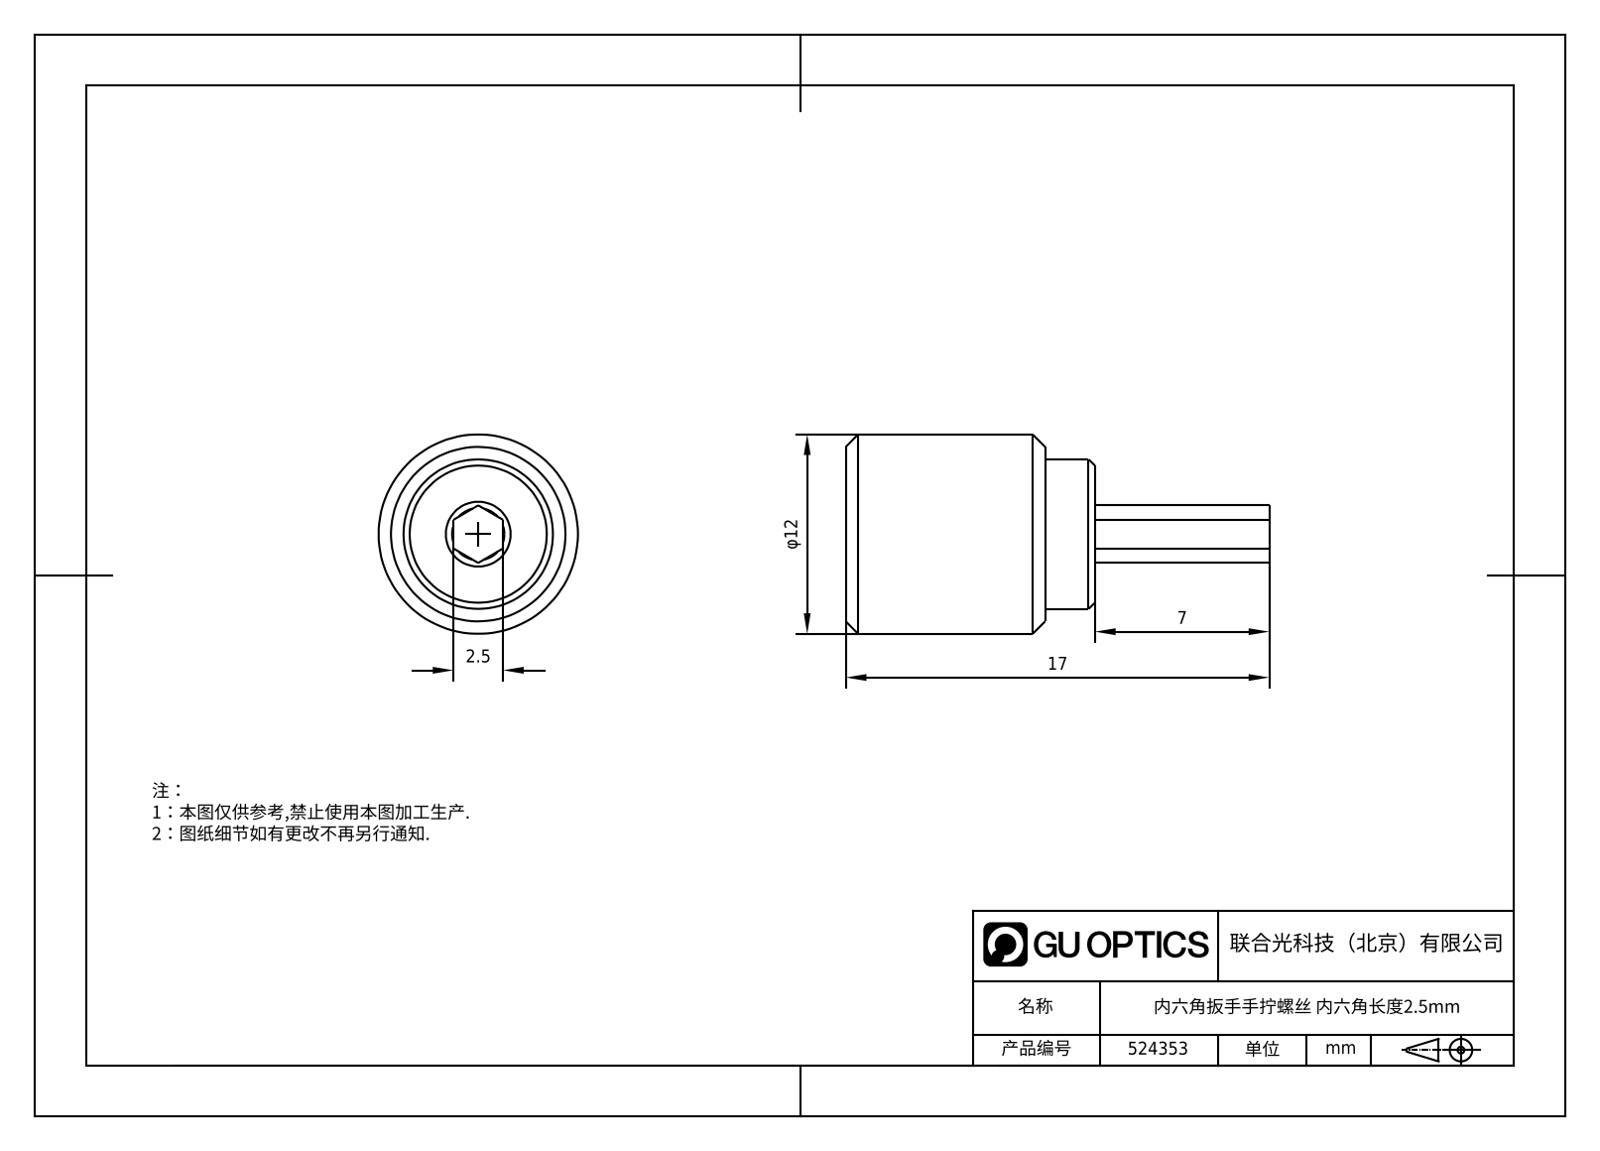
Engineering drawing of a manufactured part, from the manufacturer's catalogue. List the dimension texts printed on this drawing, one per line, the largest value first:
17
φ12
7
2.5
